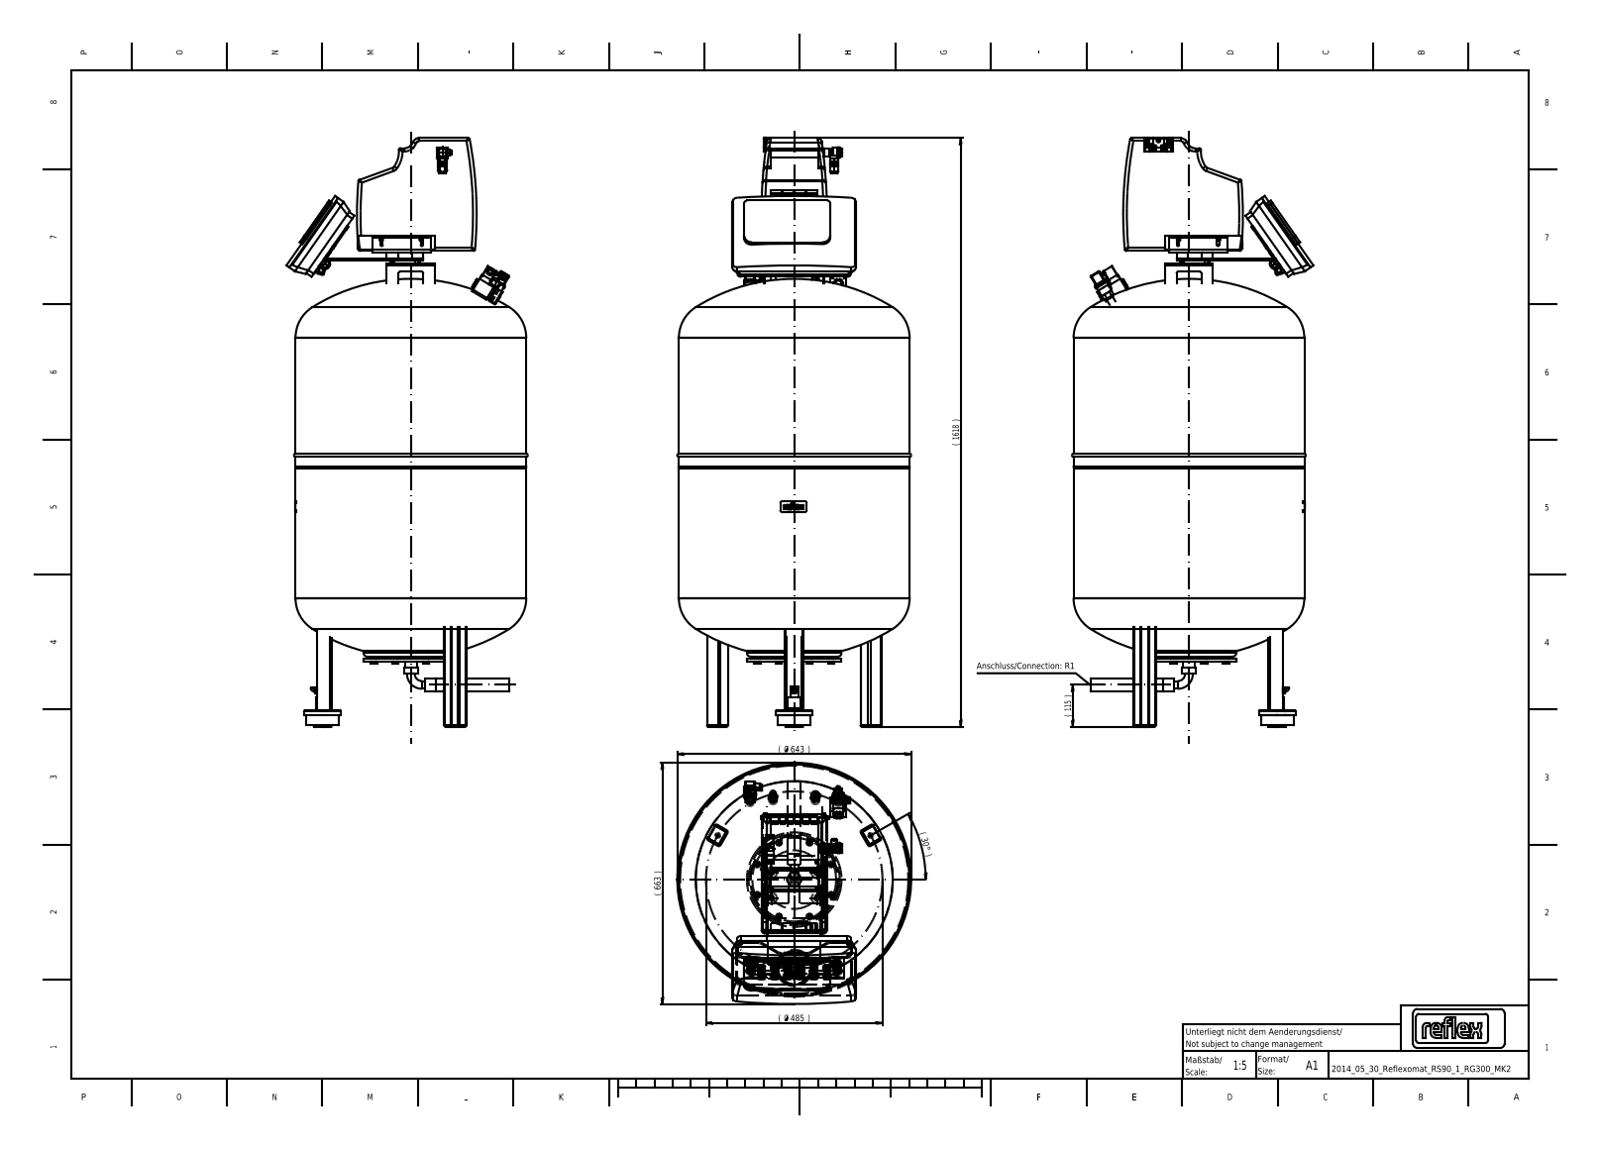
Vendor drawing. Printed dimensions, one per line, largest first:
1618 ( )
663 ( )
643 Ø ( )
485 Ø ( )
115 ( )
30 ° ( )
